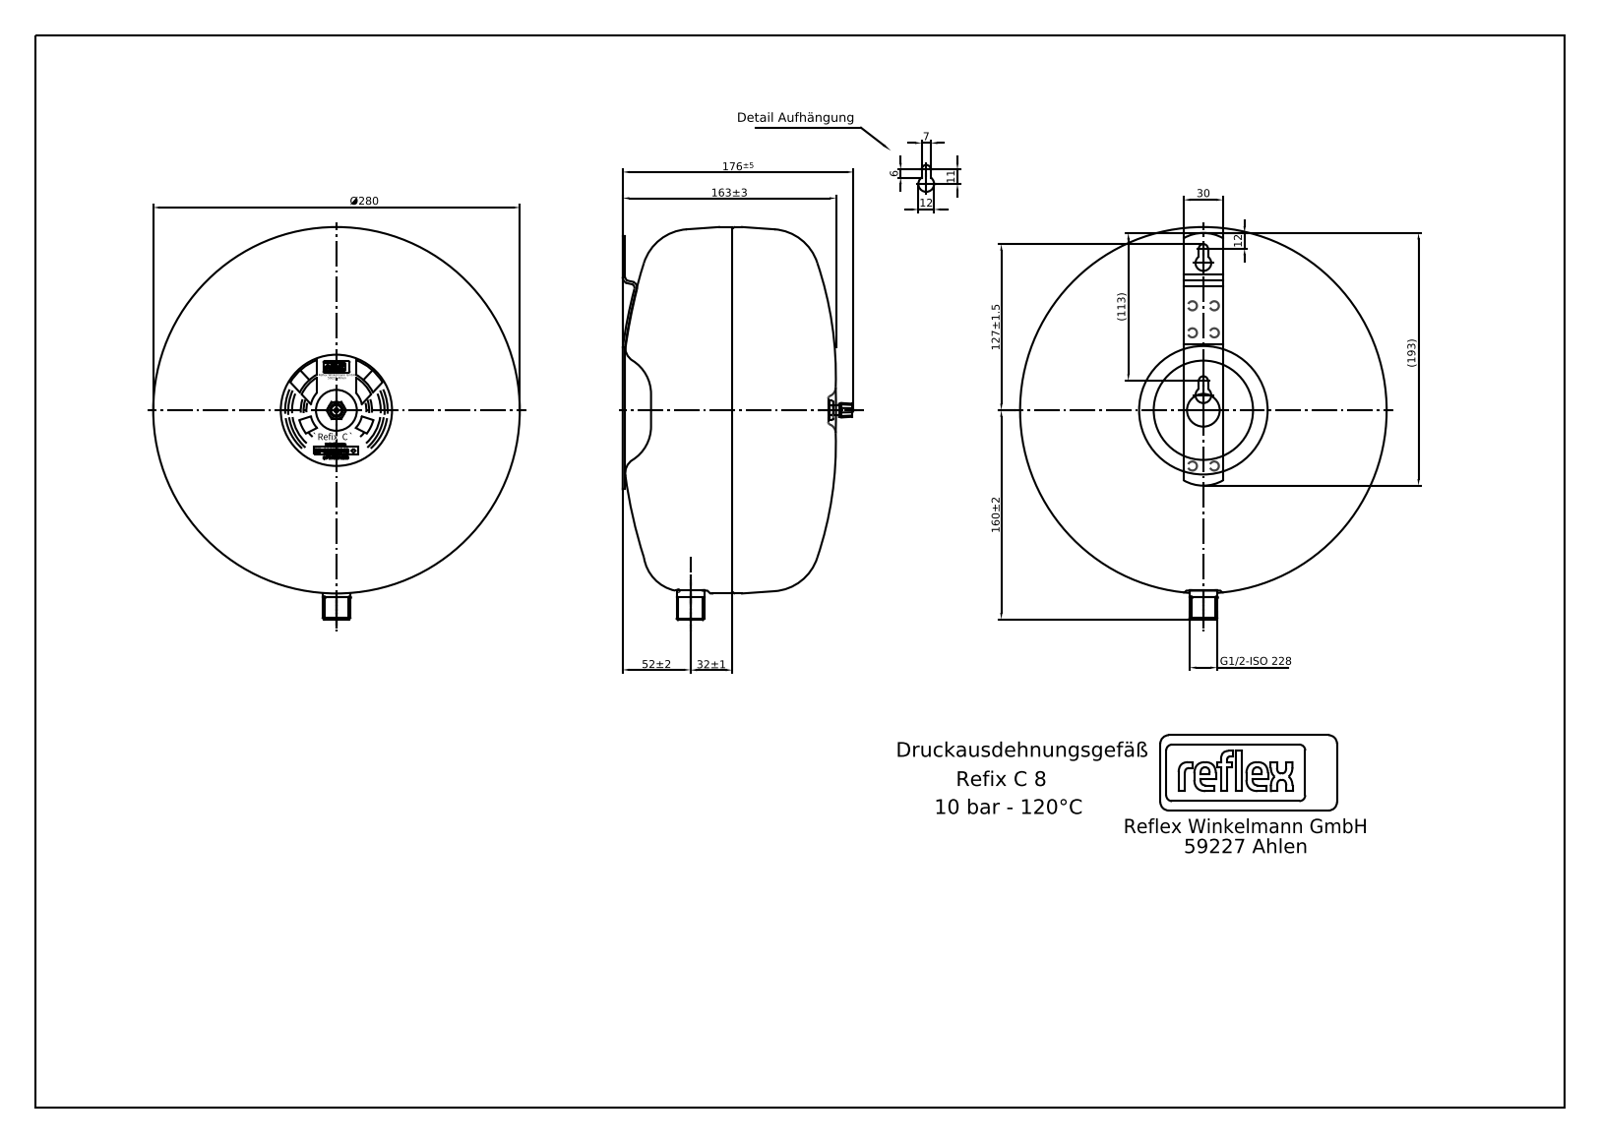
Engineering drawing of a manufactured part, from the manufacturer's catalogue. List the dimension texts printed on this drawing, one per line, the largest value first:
Ø280
(193)
176±5
163±3
160±2
127±1.5
(113)
52±2
32±1
30
12
12
11
7
6
G1/2-ISO 228
